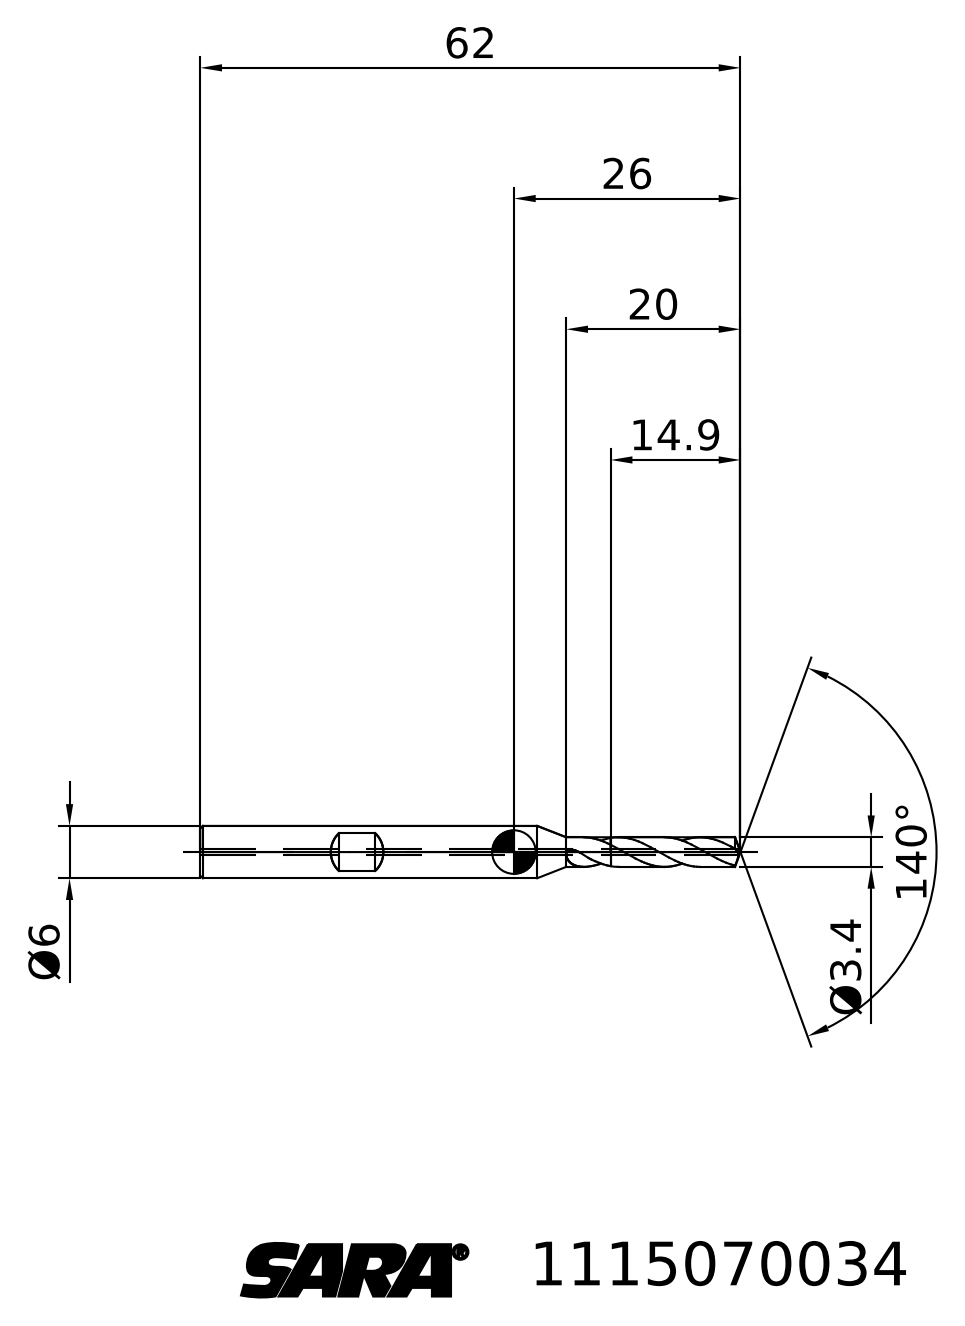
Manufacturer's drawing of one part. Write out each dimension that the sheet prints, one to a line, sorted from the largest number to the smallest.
140°
62
26
20
14.9
Ø6
Ø3.4
